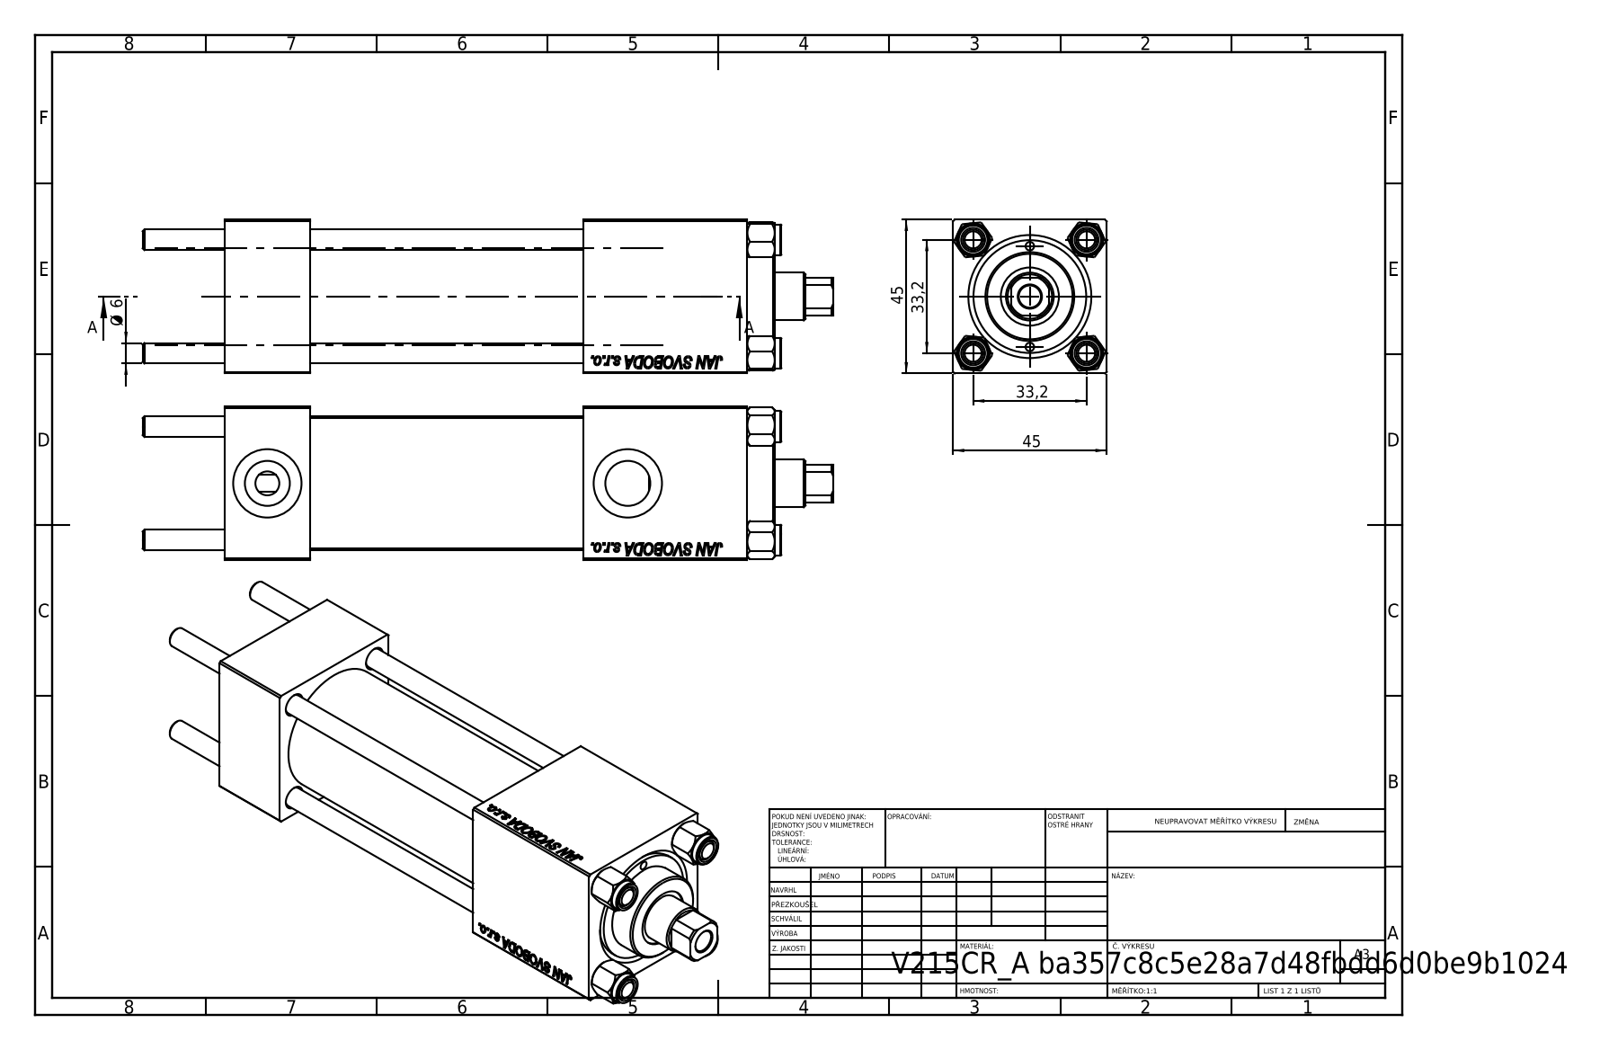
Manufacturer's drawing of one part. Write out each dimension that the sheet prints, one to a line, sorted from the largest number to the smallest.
45
45
33,2
33,2
Ø 6
